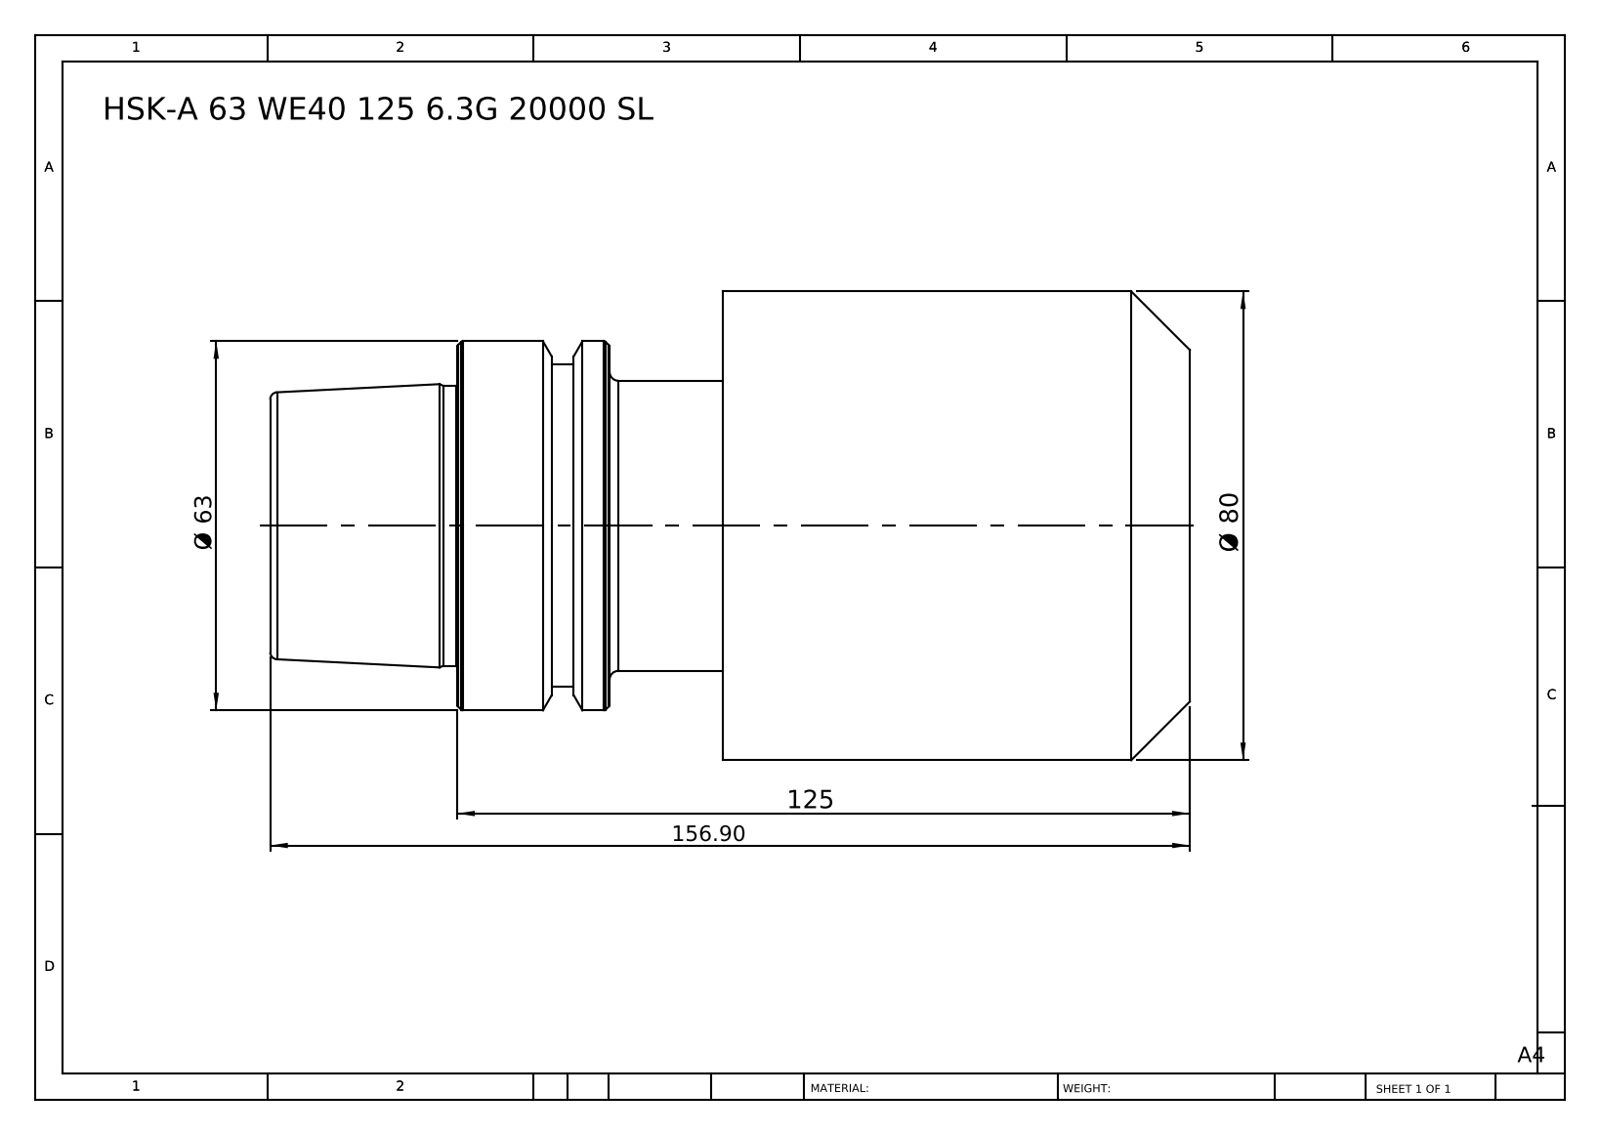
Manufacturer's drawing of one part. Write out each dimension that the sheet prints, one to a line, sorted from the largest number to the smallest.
156.90
125
Ø 80
Ø 63
